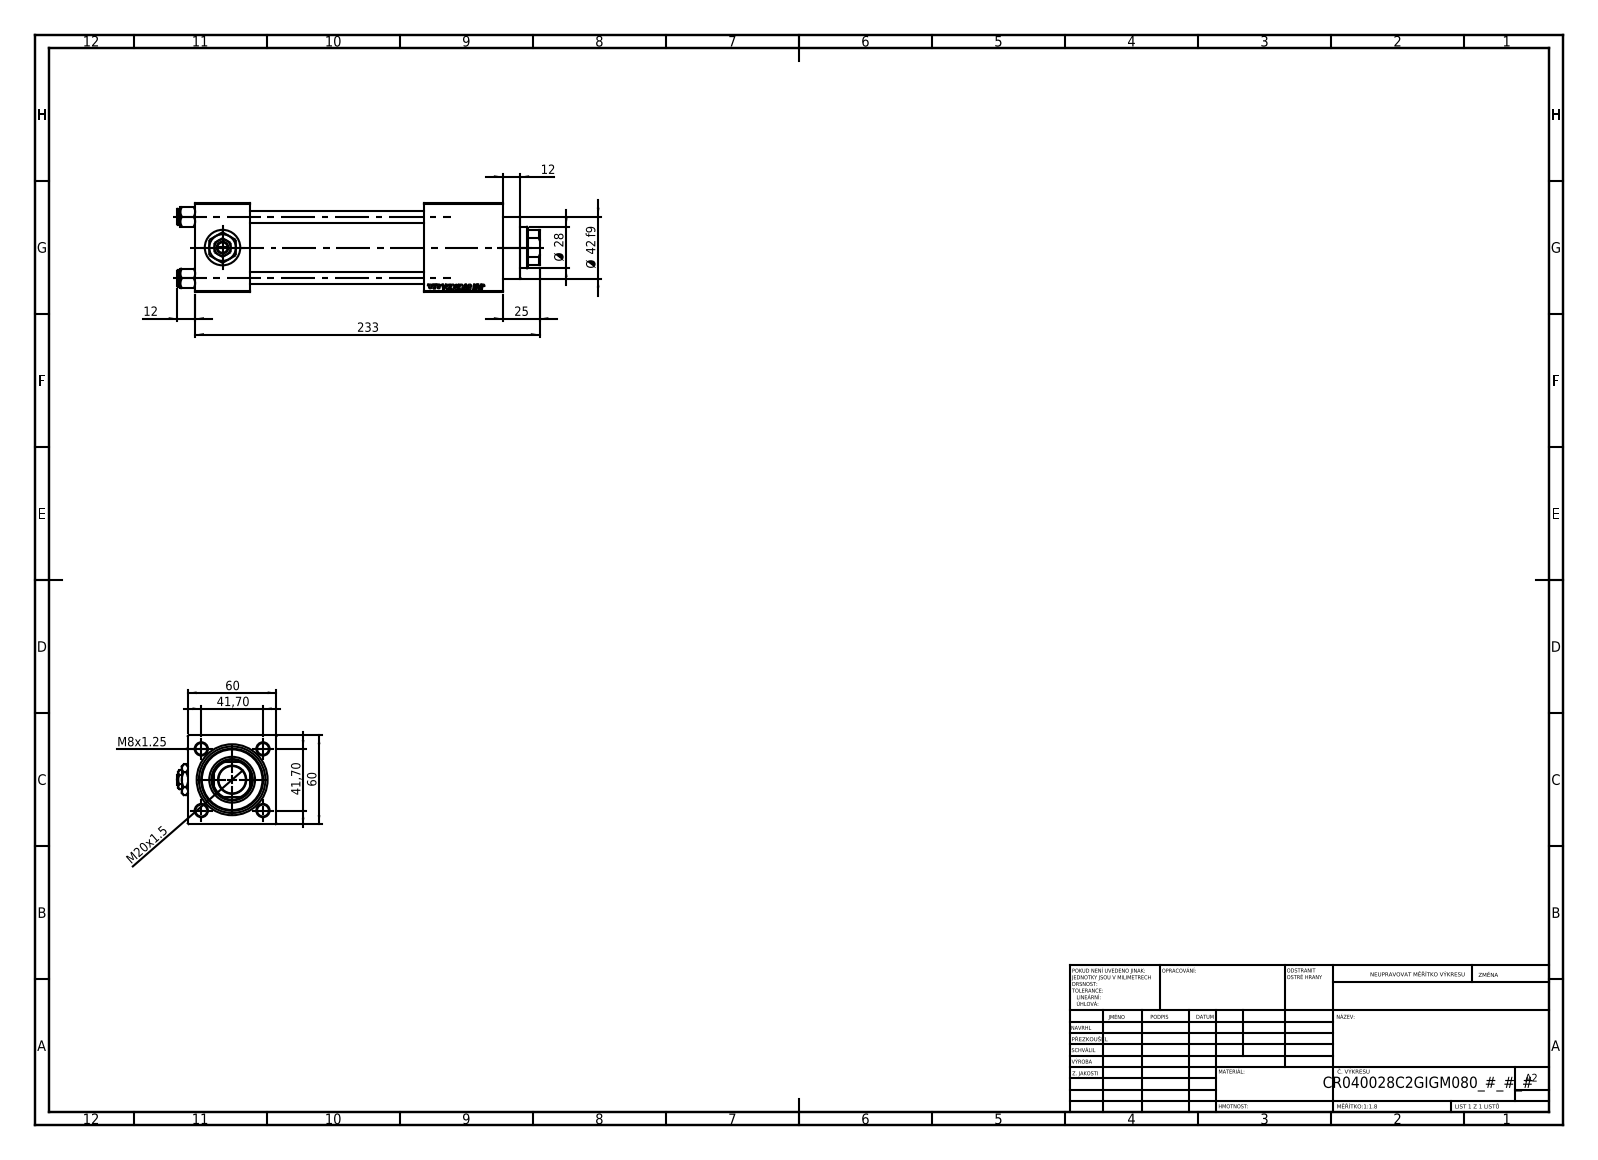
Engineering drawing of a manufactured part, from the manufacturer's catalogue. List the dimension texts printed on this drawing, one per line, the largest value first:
233
60
60
Ø 42 f9
41,70
41,70
Ø 28
25
M20x1.5
12
12
M8x1.25
